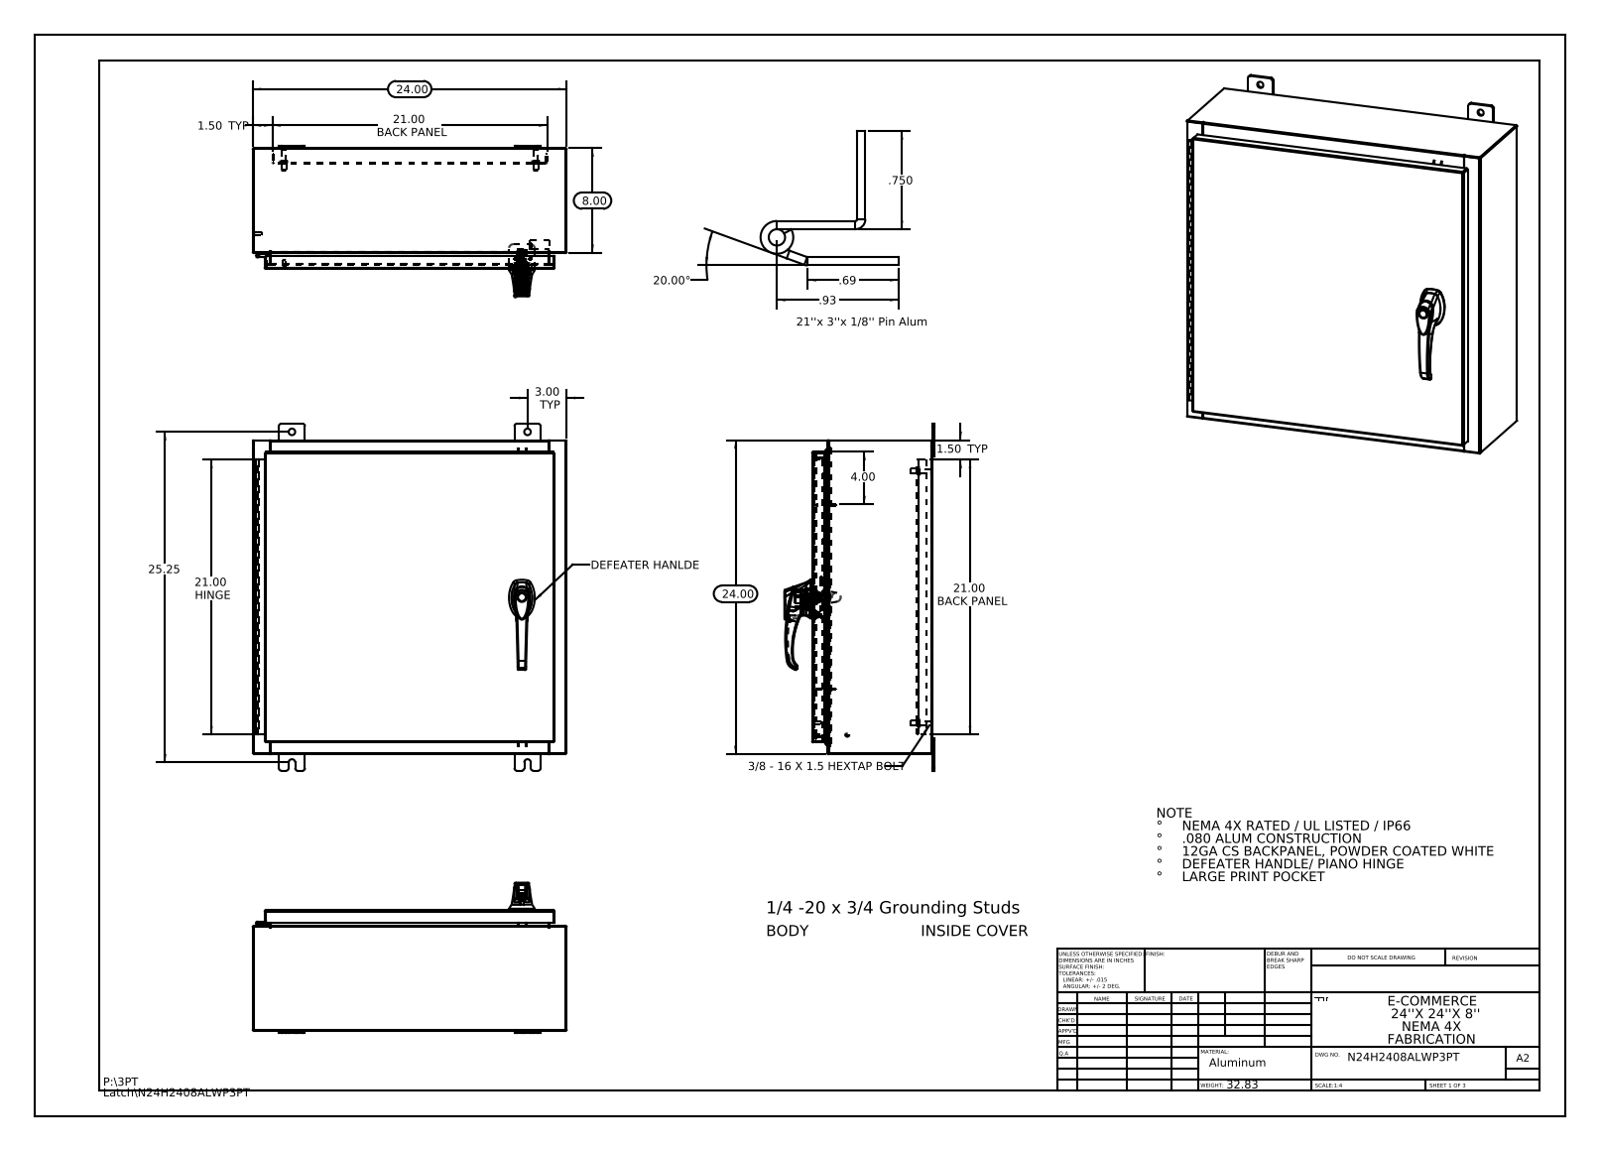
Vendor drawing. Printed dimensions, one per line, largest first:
25.25
24.00
24.00
21.00 HINGE
21.00 BACK PANEL
21.00 BACK PANEL
20.00°
8.00
4.00
3.00 TYP
1.50 TYP
1.50 TYP
.93
.750
.69
